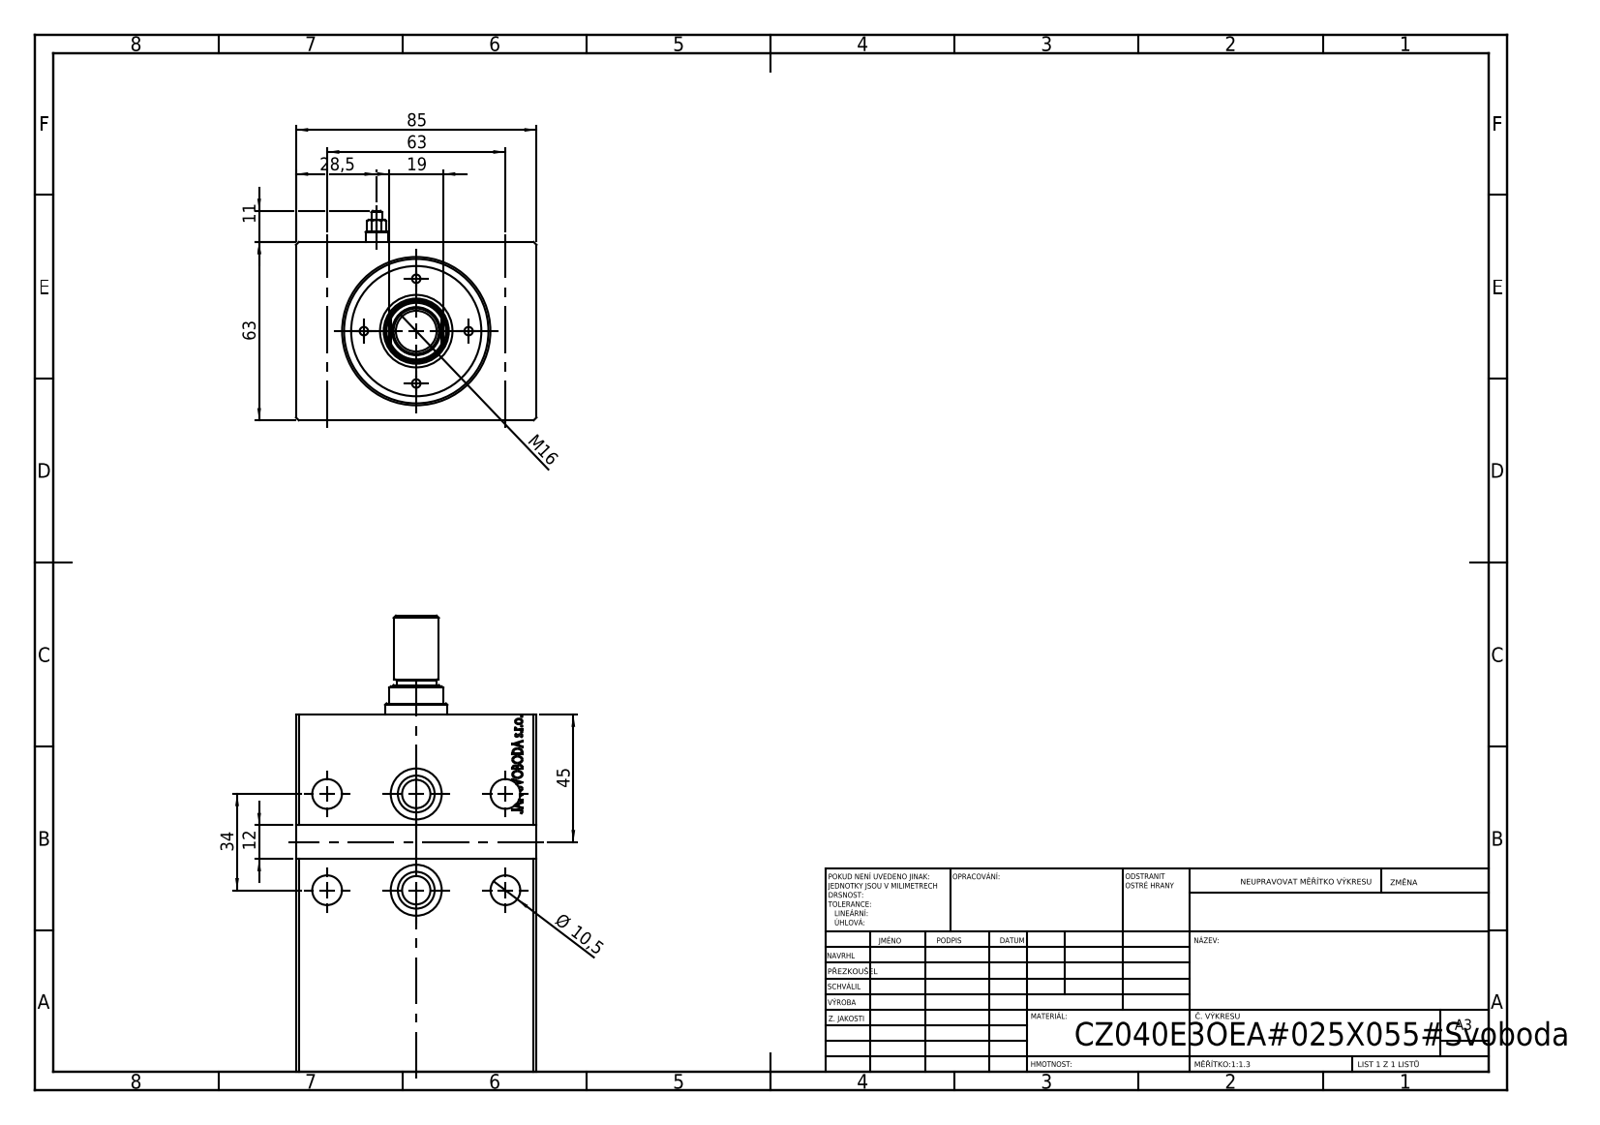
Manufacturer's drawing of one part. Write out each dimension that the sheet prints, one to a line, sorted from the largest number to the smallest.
85
63
63
45
34
28,5
19
M16
12
11
Ø 10,5
